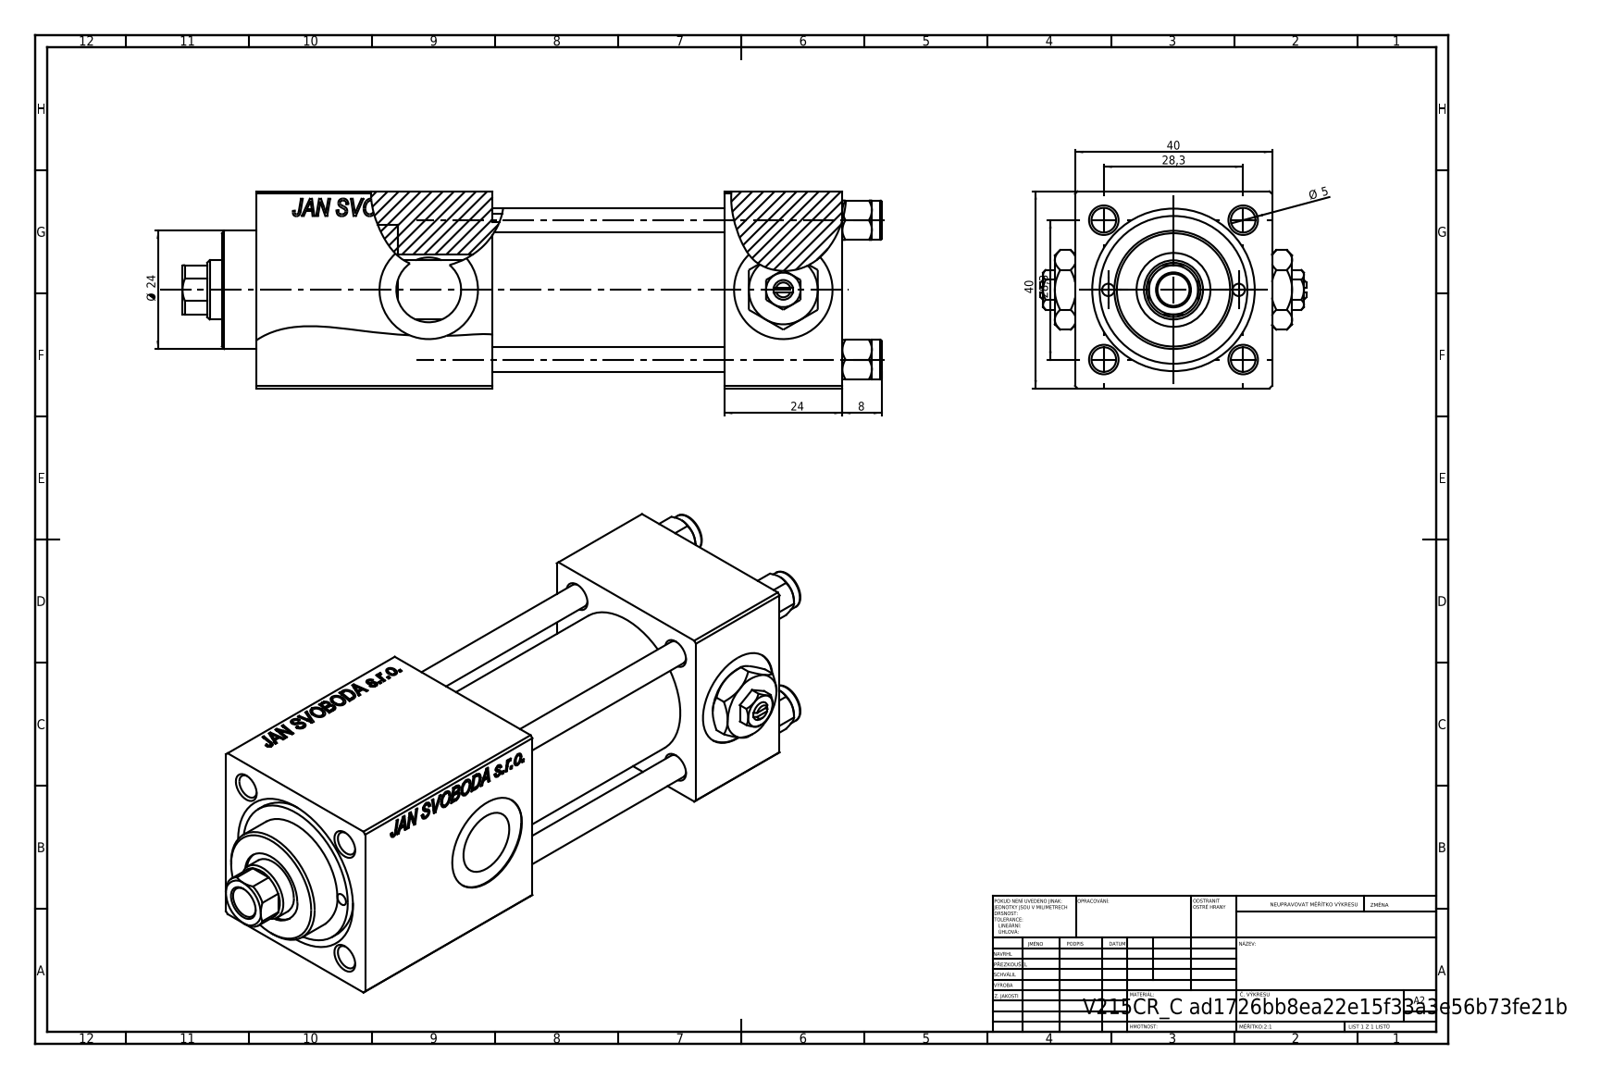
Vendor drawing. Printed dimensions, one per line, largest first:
40
40
28,3
28,3
24
Ø 24
8
Ø 5
